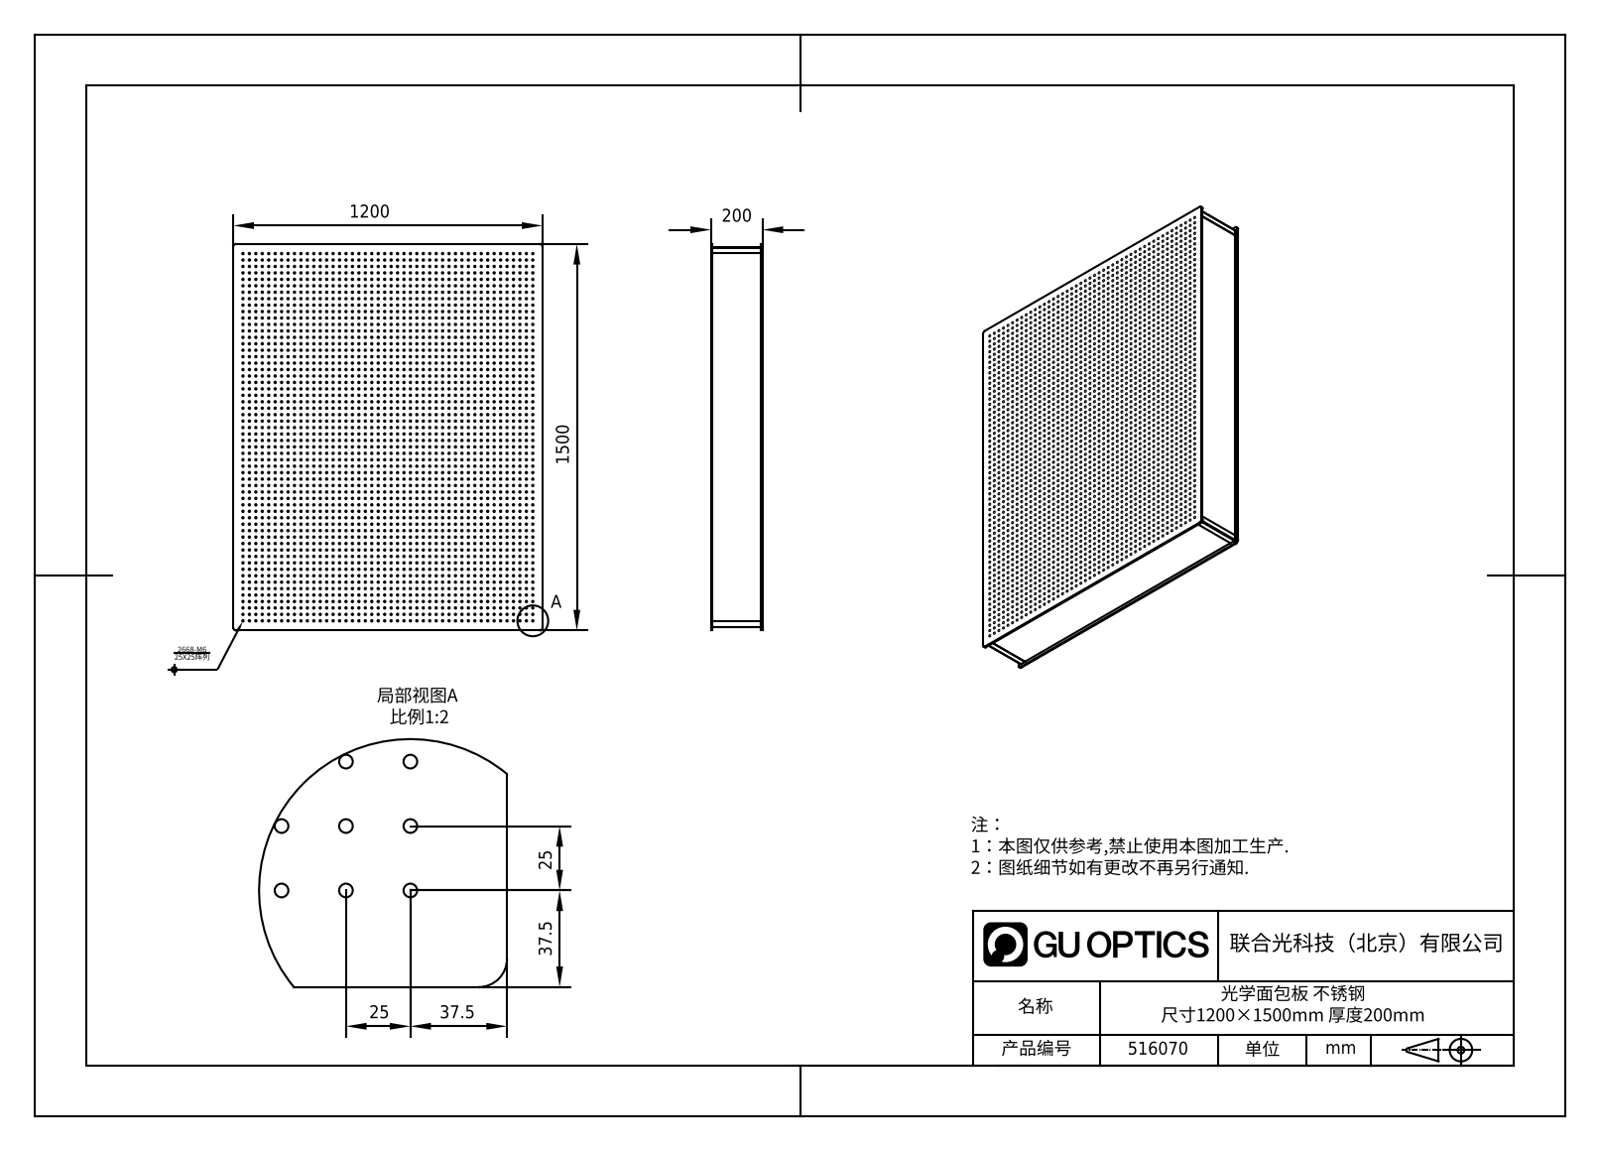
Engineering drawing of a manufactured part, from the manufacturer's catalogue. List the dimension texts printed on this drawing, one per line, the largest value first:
1500
1200
200
37.5
37.5
25
25
